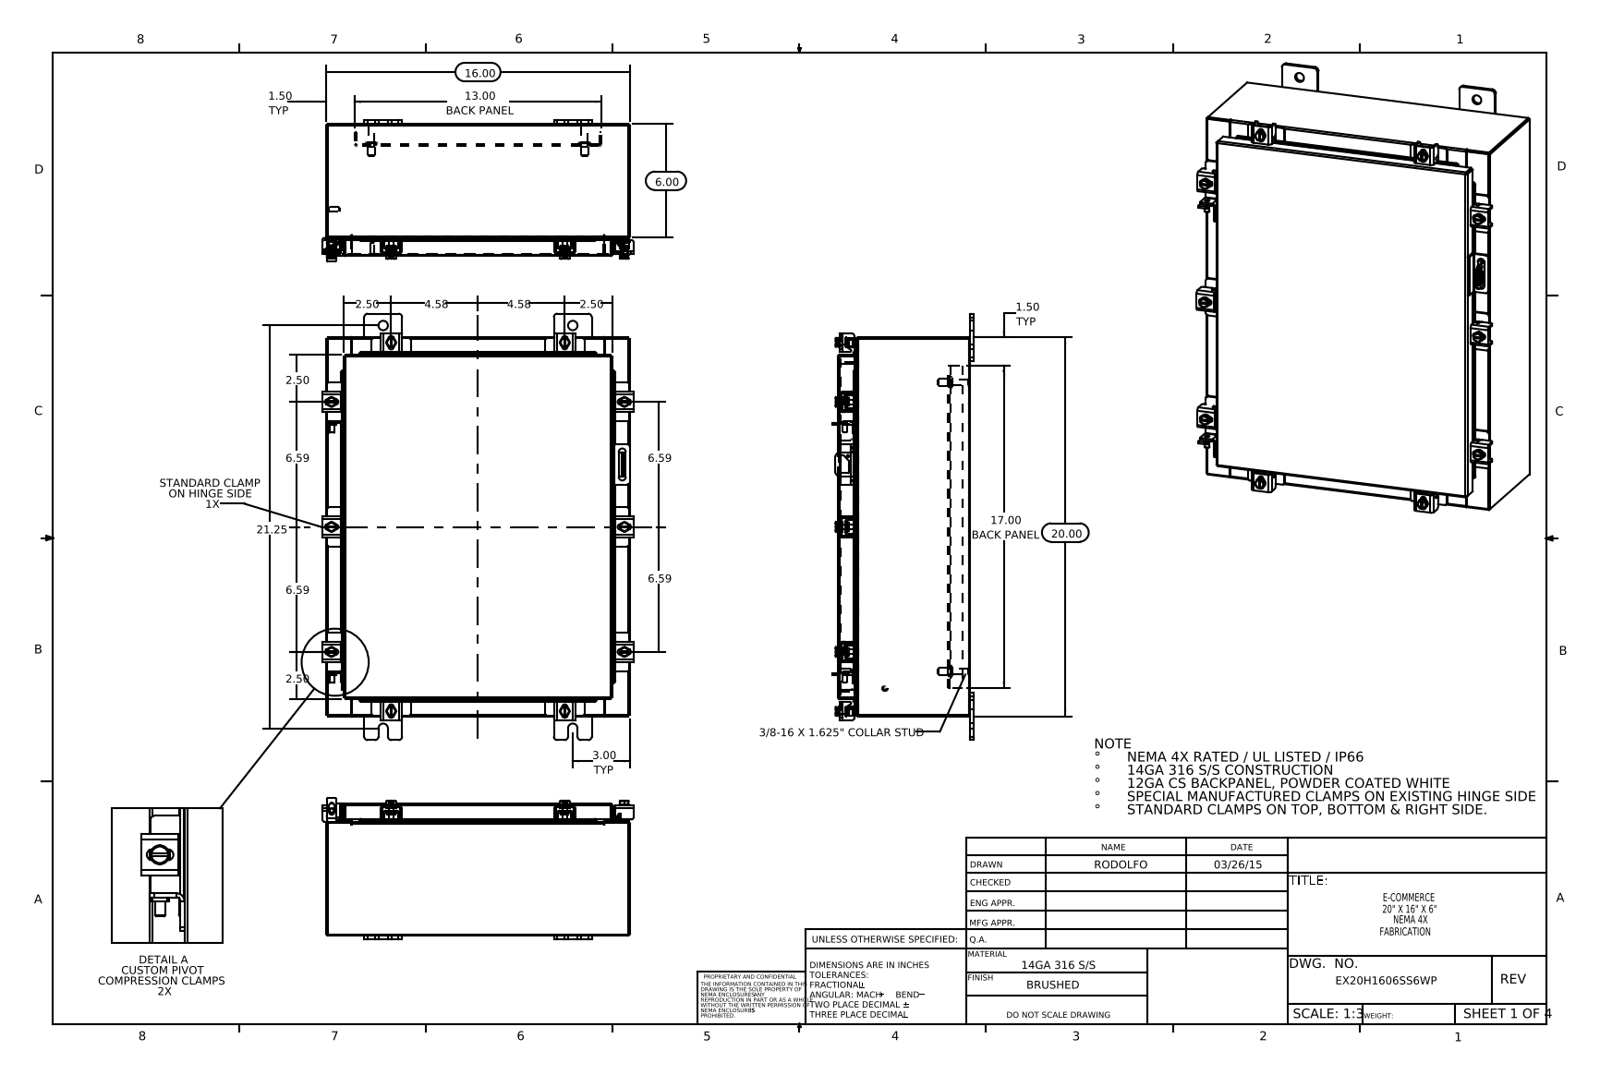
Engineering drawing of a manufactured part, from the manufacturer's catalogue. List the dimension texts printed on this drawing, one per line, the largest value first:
21.25
20.00
17.00 BACK PANEL
16.00
13.00 BACK PANEL
6.59
6.59
6.59
6.59
6.00
4.58
4.58
3.00 TYP
2.50
2.50
2.50
2.50
1.50 TYP
1.50 TYP
